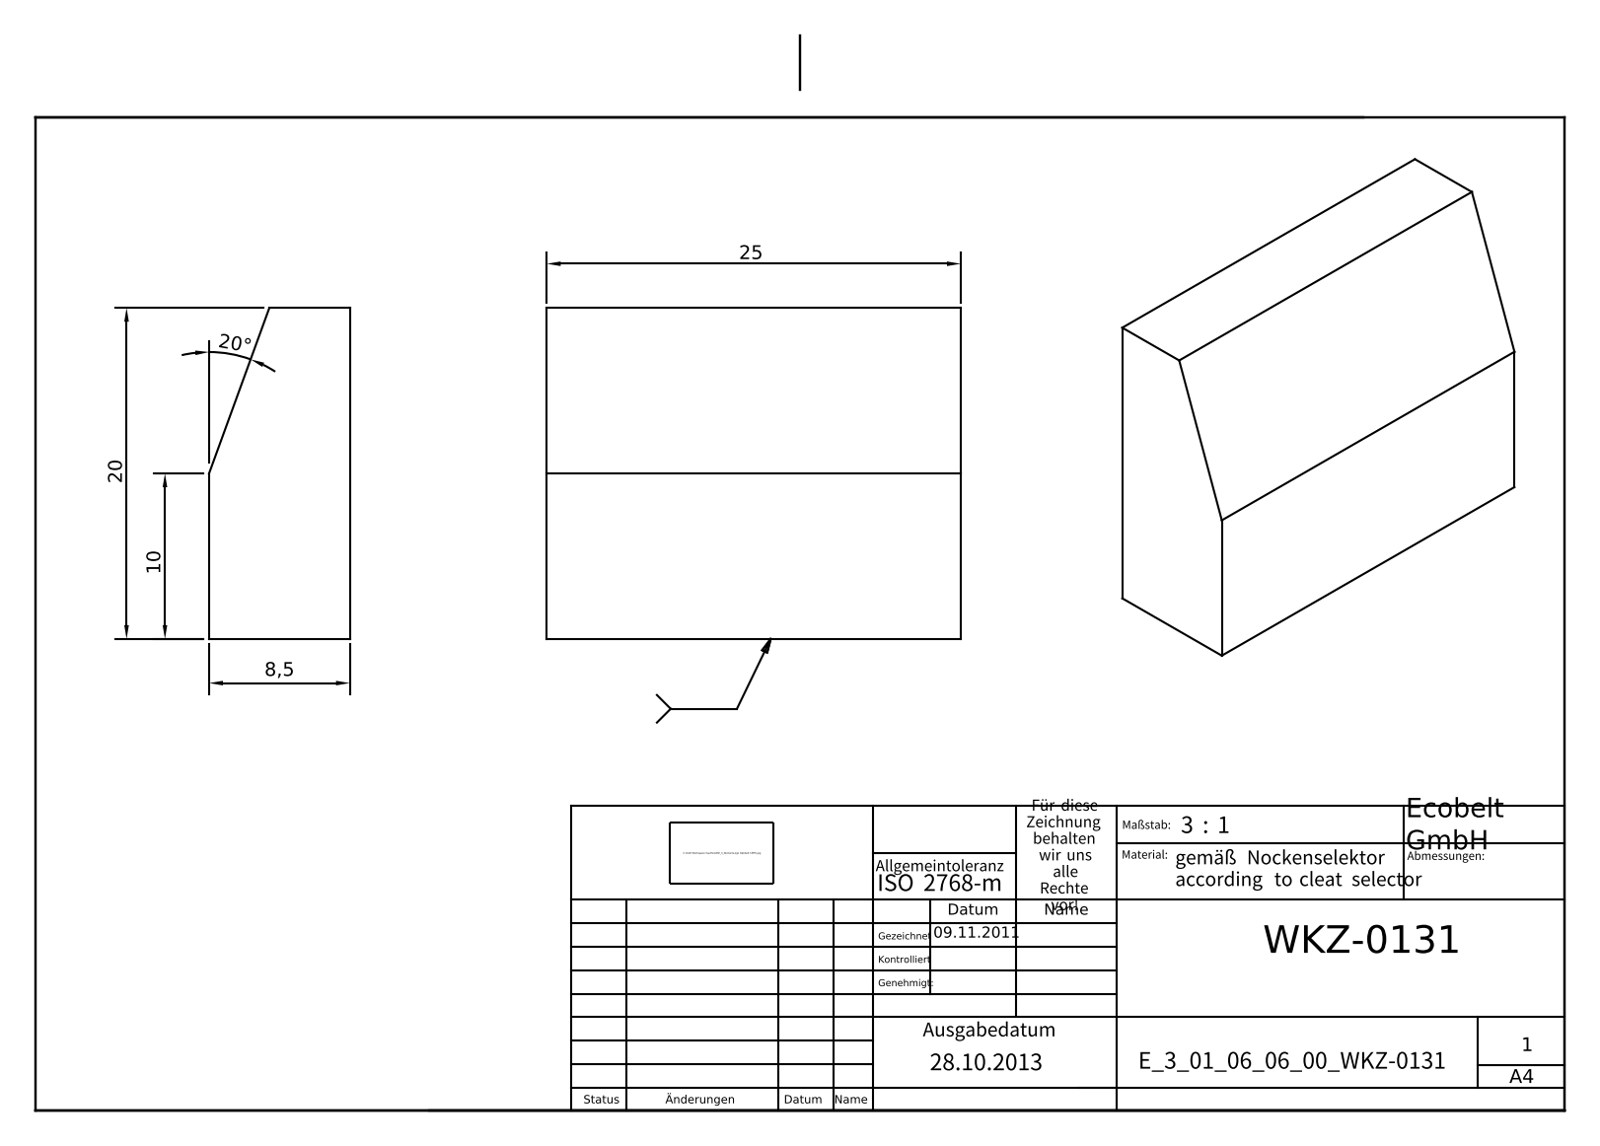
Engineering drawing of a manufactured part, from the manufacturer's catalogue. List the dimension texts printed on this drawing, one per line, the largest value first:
25
20°
20
10
8,5
